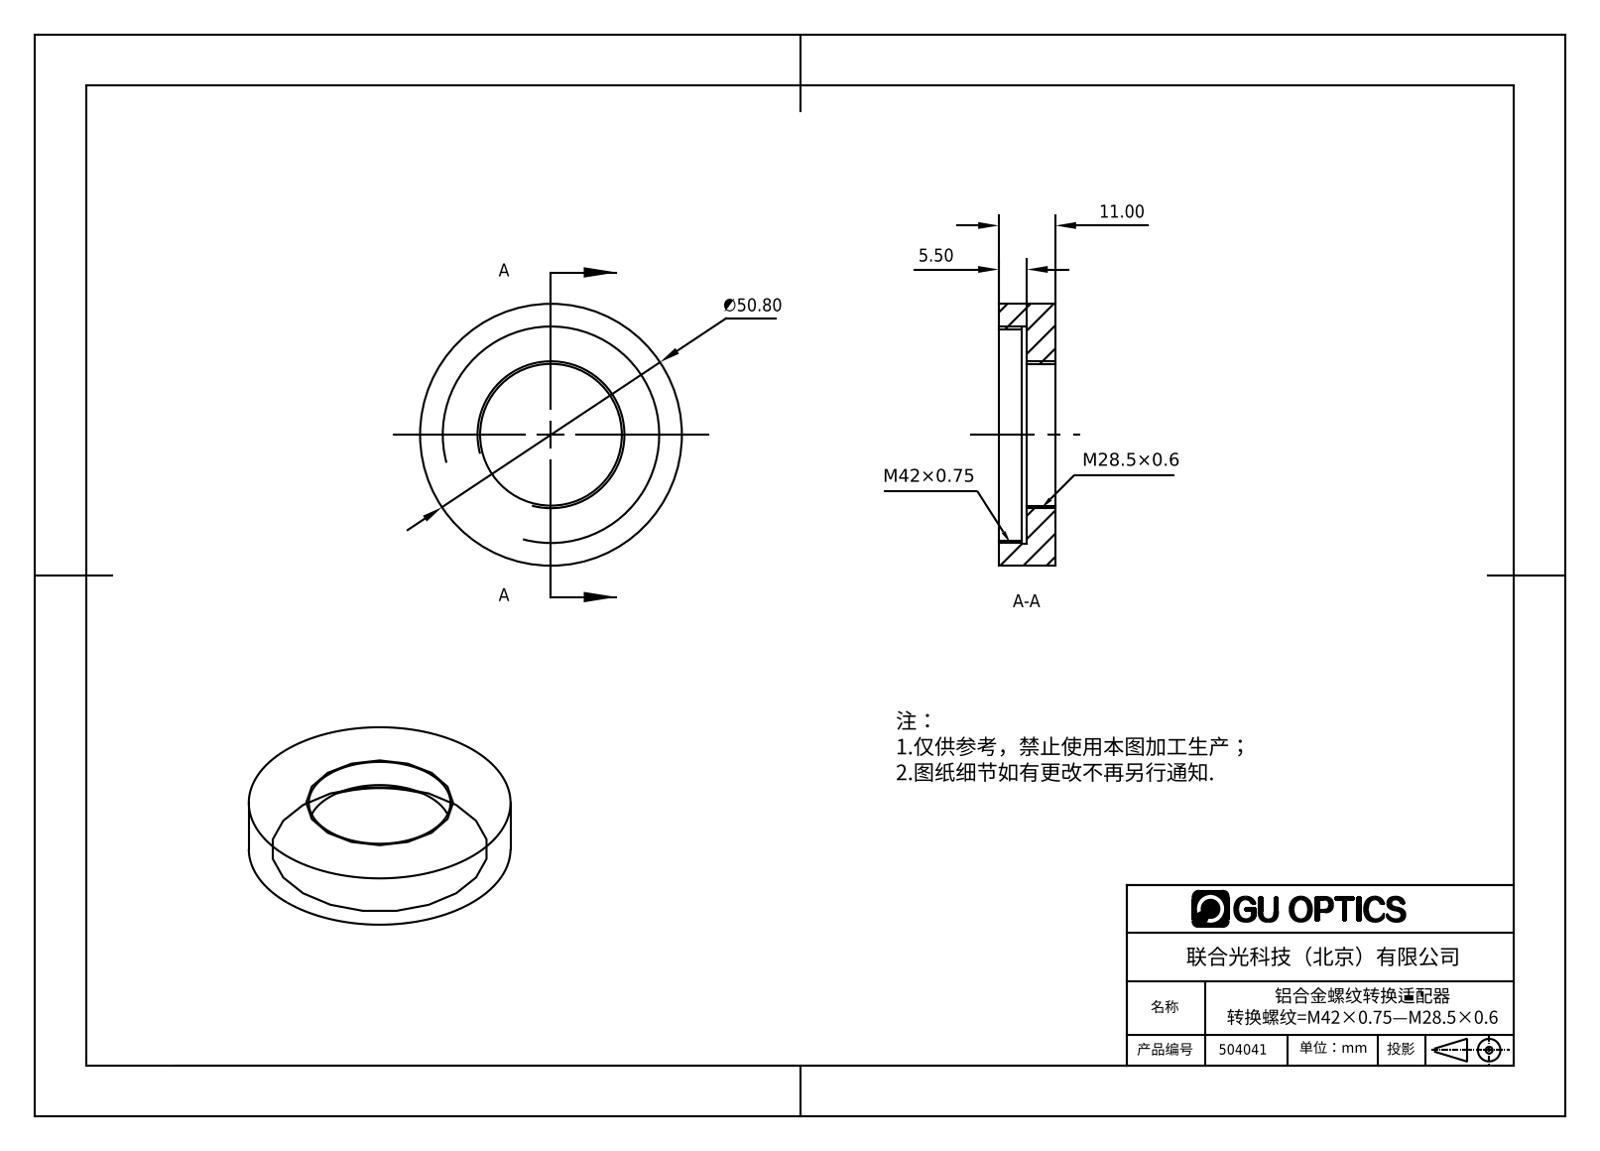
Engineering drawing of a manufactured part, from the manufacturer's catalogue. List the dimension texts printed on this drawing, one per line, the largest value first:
∅50.80
11.00
5.50
